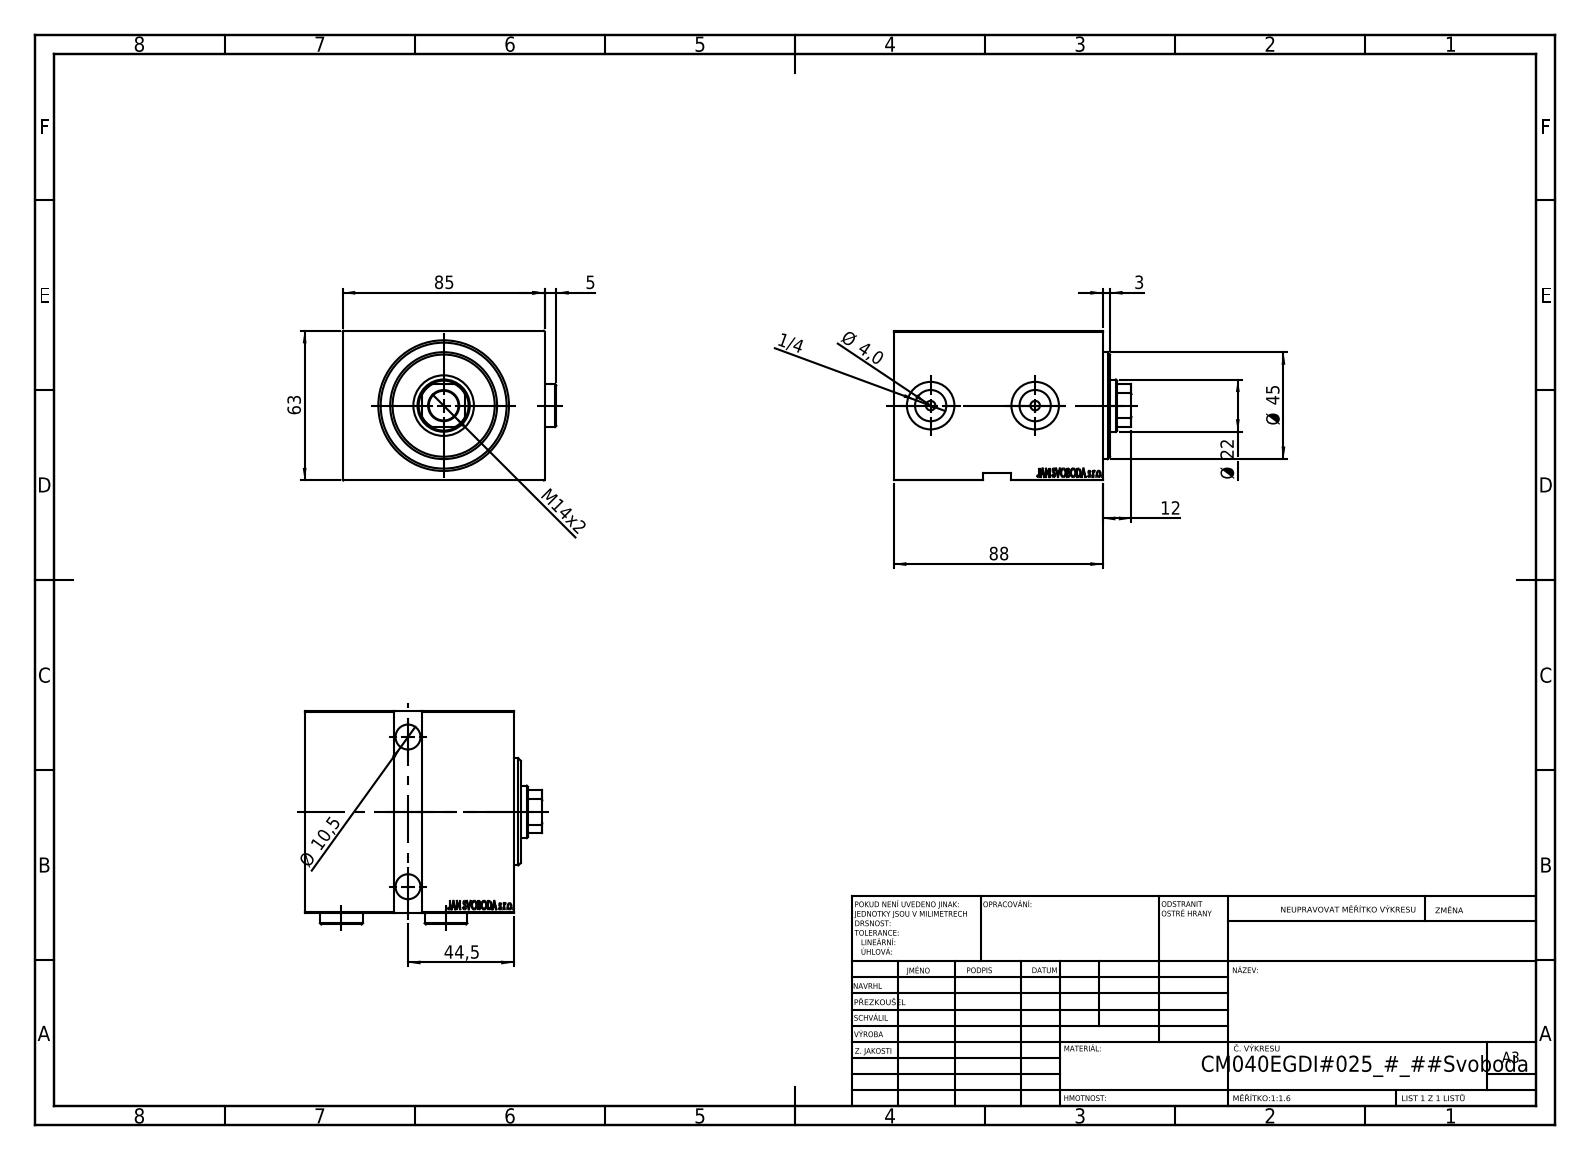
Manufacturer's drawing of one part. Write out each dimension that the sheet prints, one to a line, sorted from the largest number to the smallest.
88
85
63
Ø 45
44,5
Ø 22
M14x2
12
Ø 10,5
5
Ø 4,0
3
1/4
